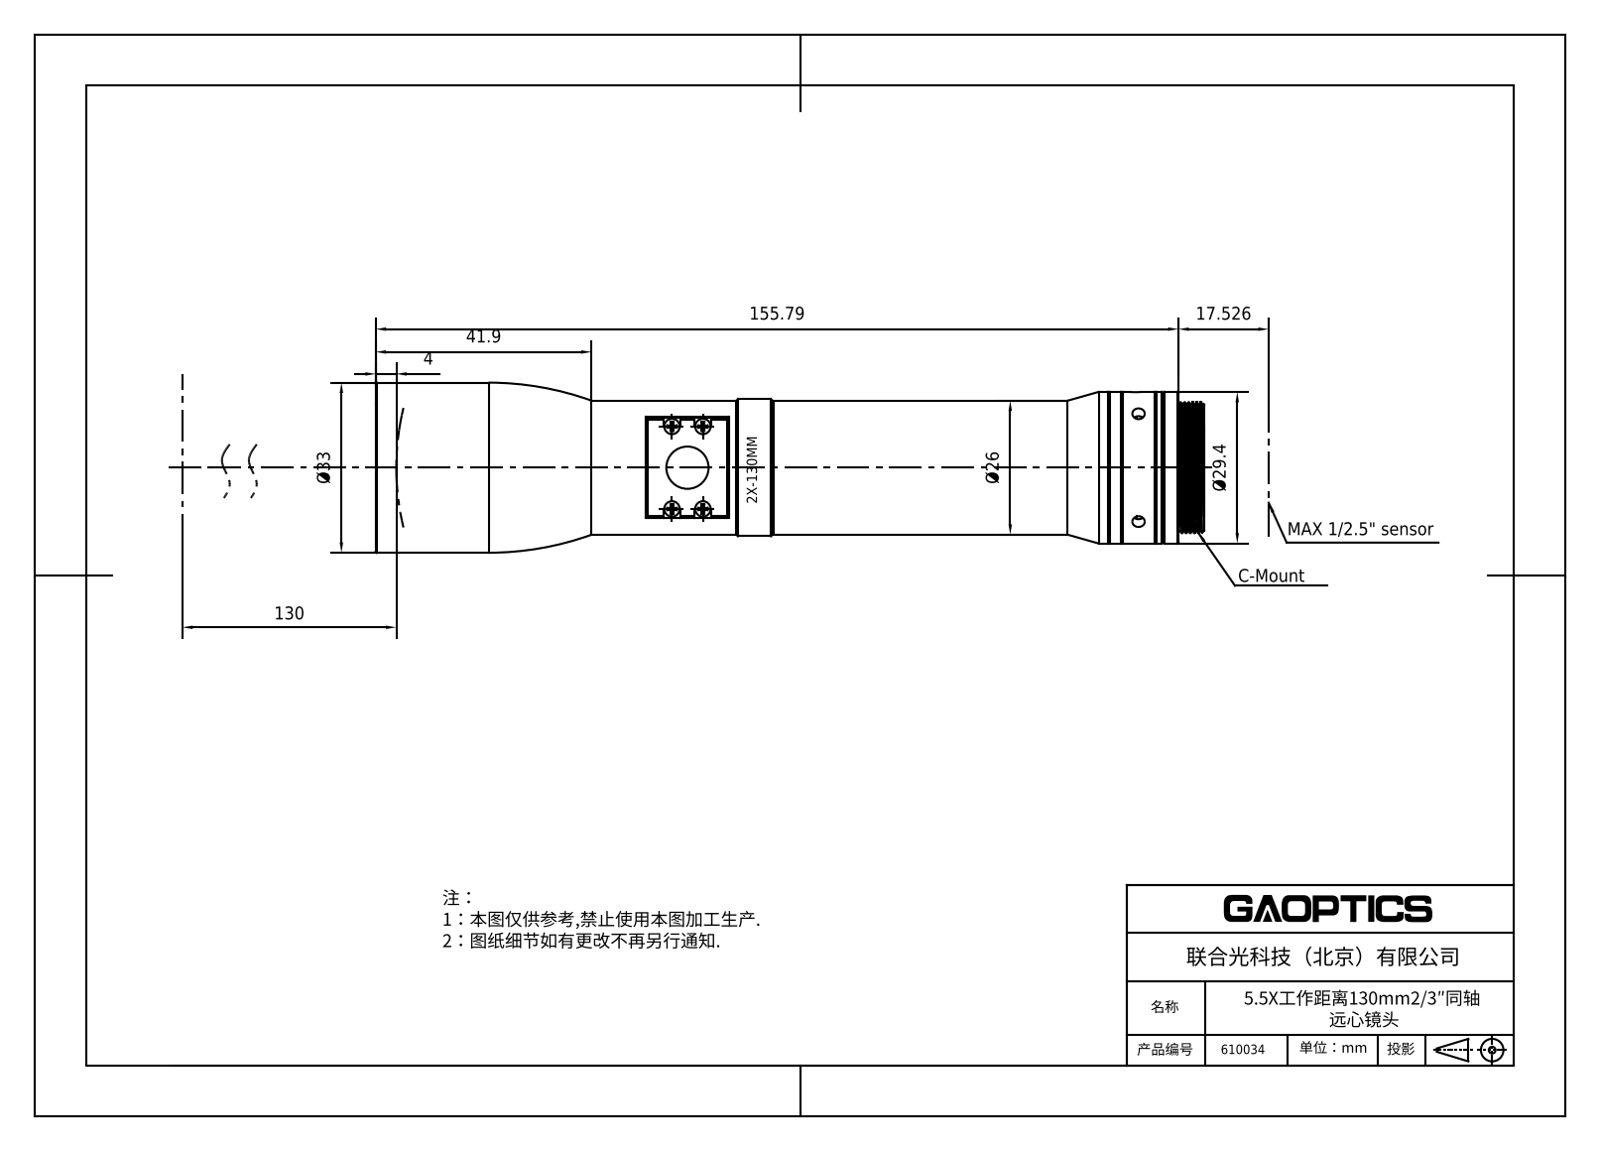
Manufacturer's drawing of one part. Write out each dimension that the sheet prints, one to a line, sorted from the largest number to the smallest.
155.79
130
41.9
Ø33
Ø29.4
Ø26
17.526
4
